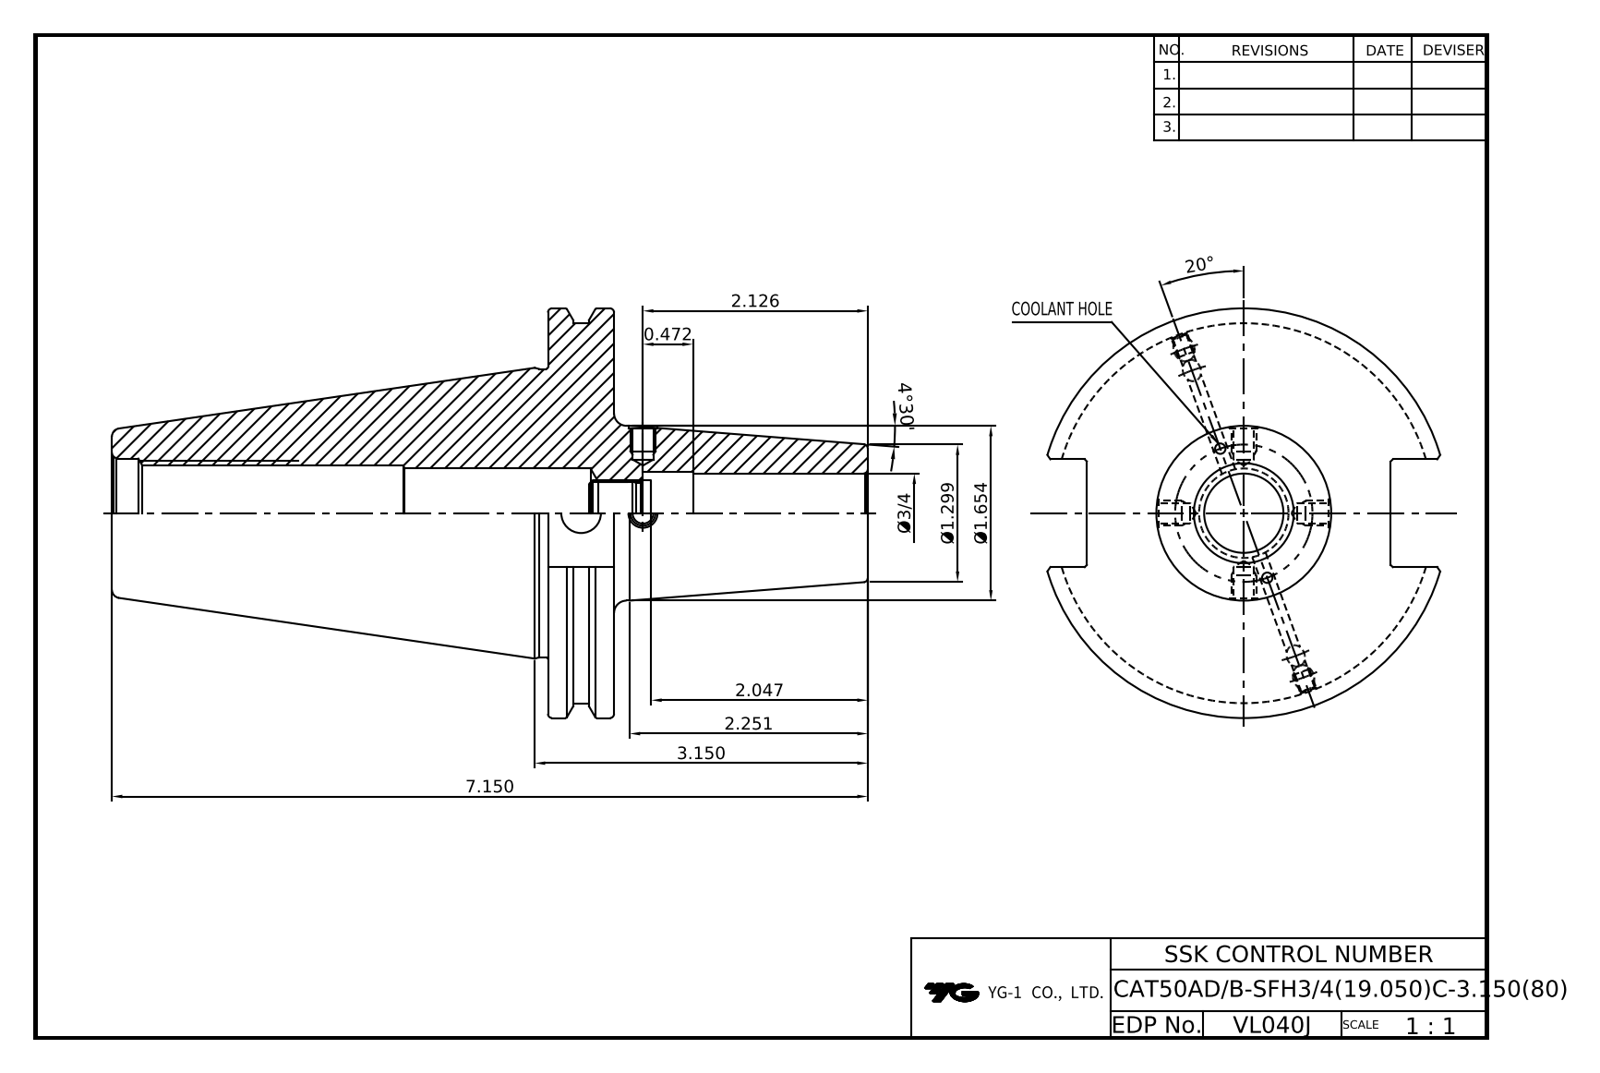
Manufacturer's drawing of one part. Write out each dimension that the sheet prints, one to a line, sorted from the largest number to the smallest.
20°
7.150
4°30'
3.150
2.251
2.126
2.047
Ø1.654
Ø1.299
0.472
